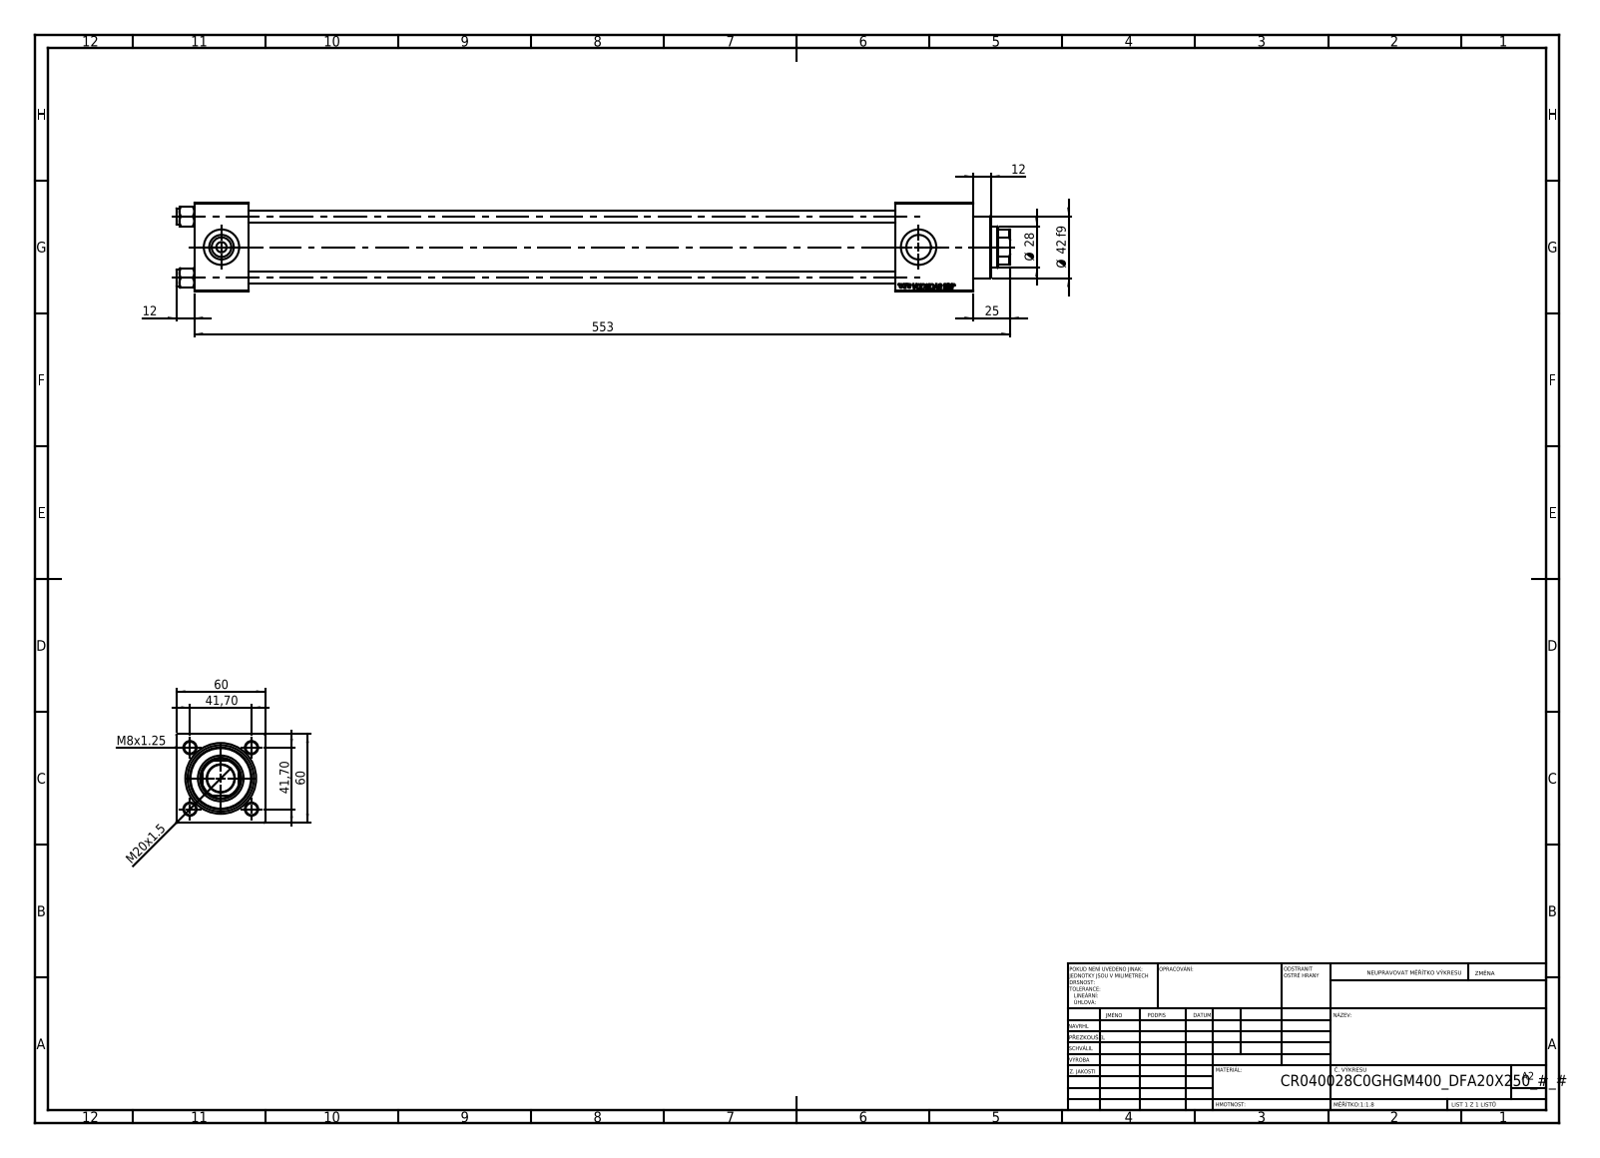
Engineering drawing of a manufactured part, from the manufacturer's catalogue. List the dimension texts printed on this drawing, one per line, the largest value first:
553
60
60
Ø 42 f9
41,70
41,70
Ø 28
25
M20x1.5
12
12
M8x1.25
